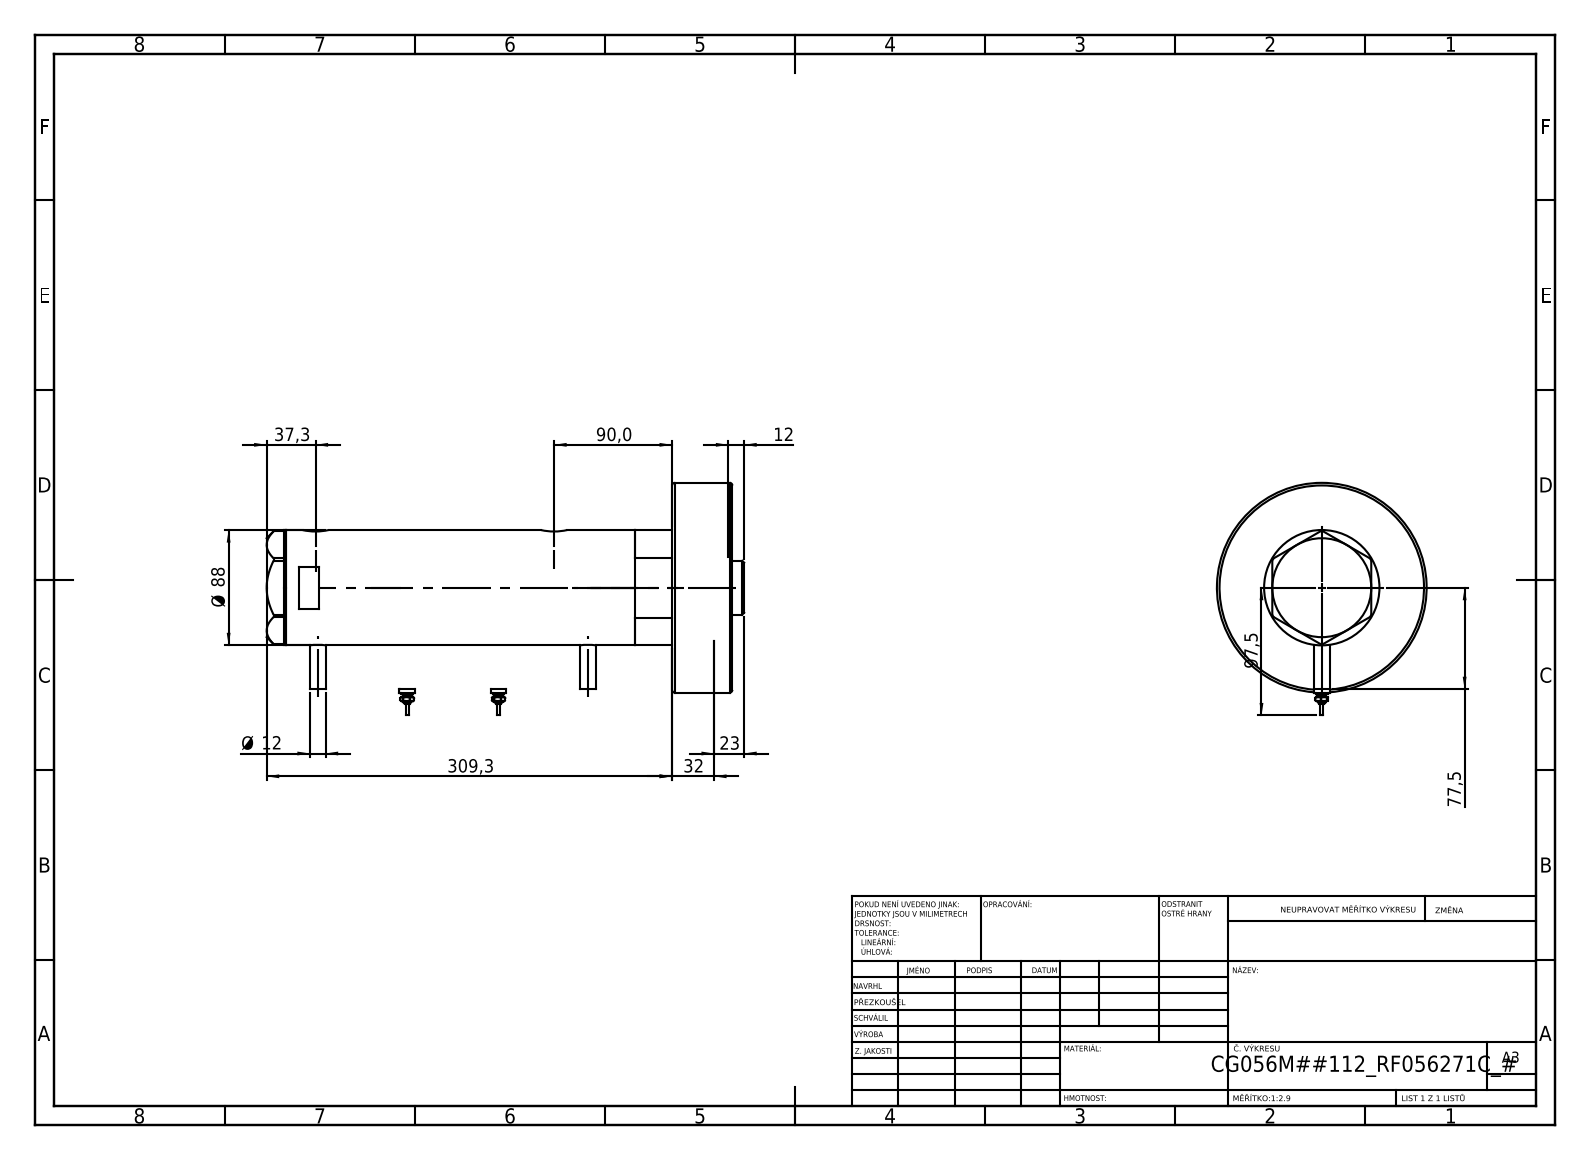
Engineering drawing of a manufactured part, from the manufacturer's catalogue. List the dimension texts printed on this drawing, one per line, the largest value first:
309,3
97,5
90,0
Ø 88
77,5
37,3
32
23
12
Ø 12
